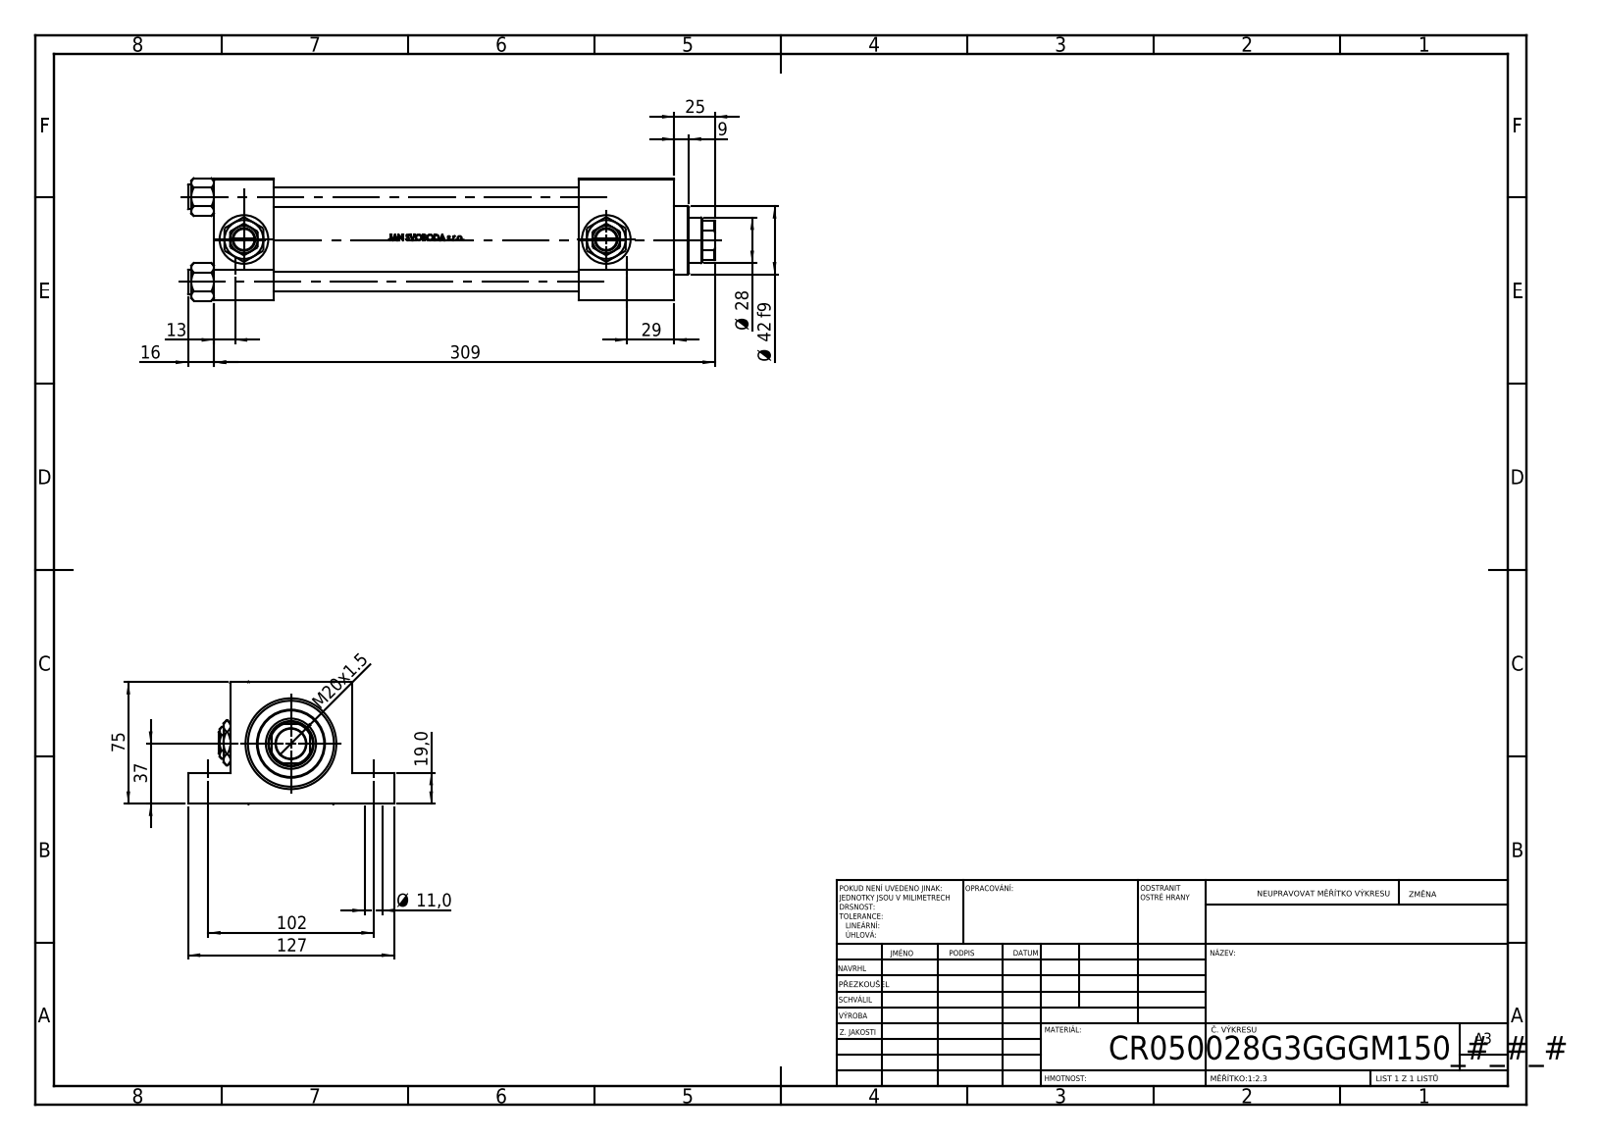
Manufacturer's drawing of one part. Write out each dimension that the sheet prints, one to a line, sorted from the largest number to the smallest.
309
127
102
75
Ø 42 f9
37
29
Ø 28
25
M20x1.5
19,0
16
13
Ø 11,0
9
